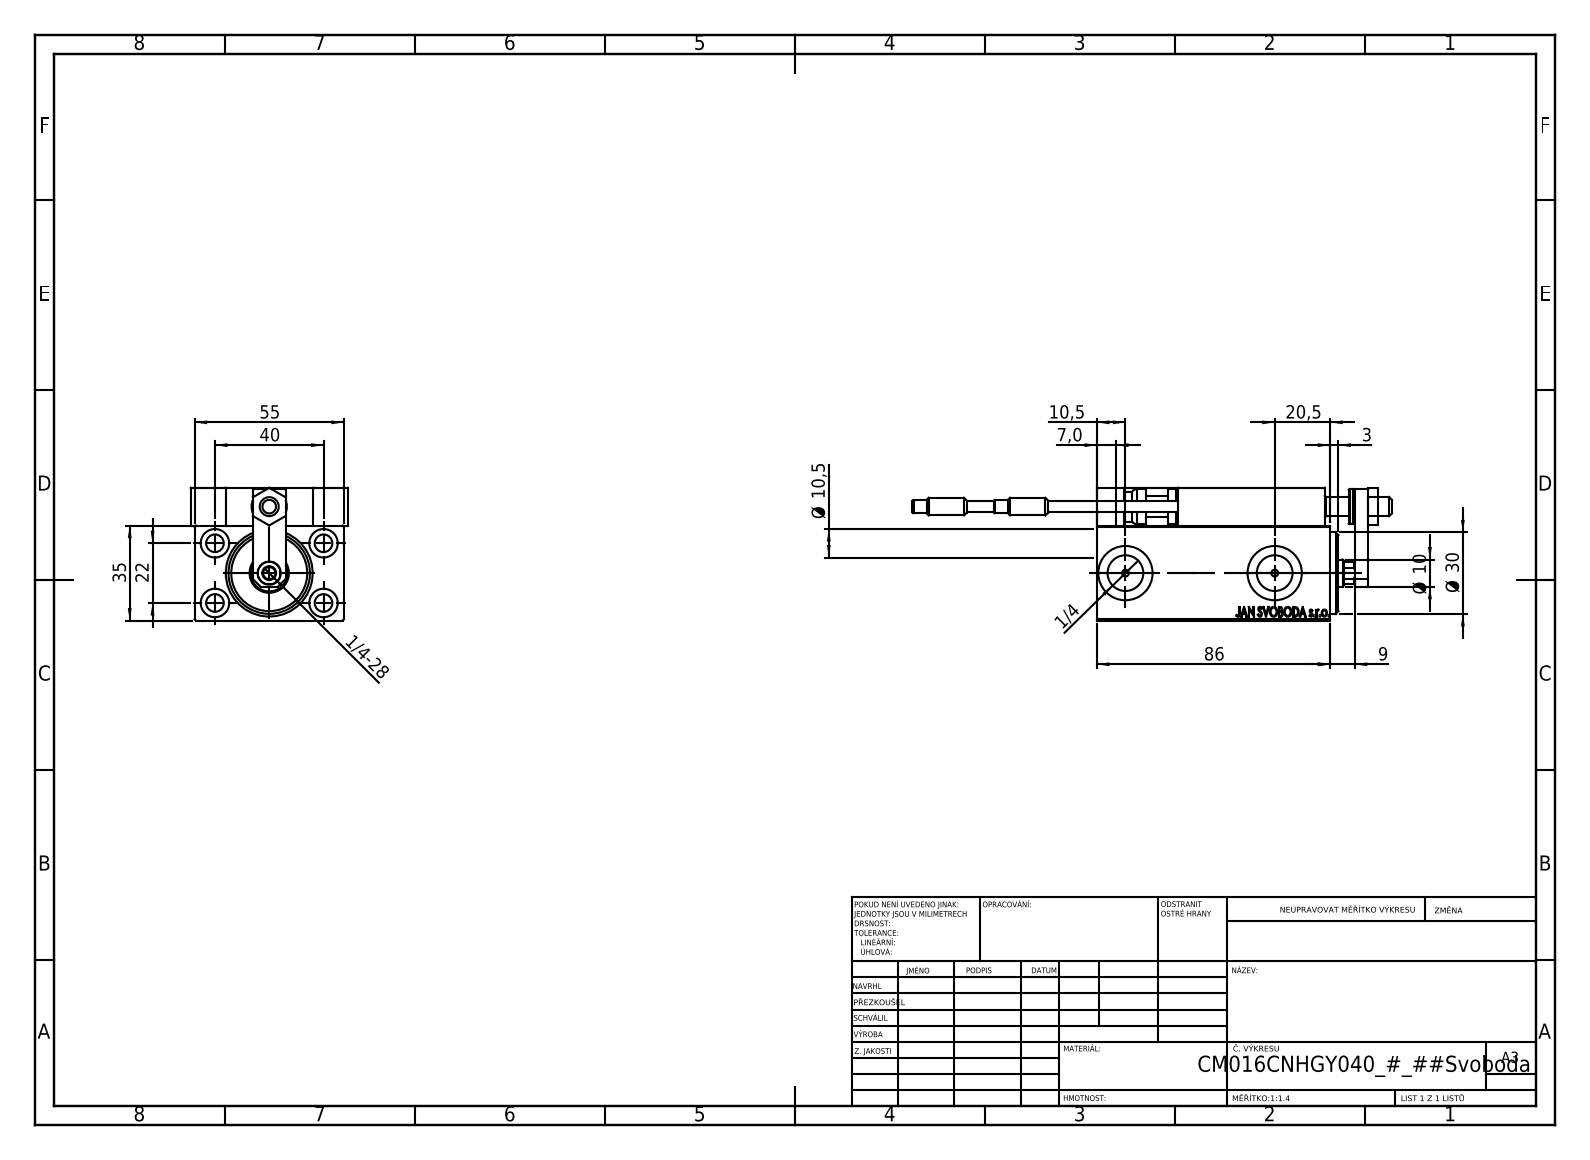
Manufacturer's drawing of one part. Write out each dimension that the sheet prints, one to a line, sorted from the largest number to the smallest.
86
55
40
35
Ø 30
22
20,5
10,5
Ø 10,5
Ø 10
9
7,0
3
1/4-28
1/4
